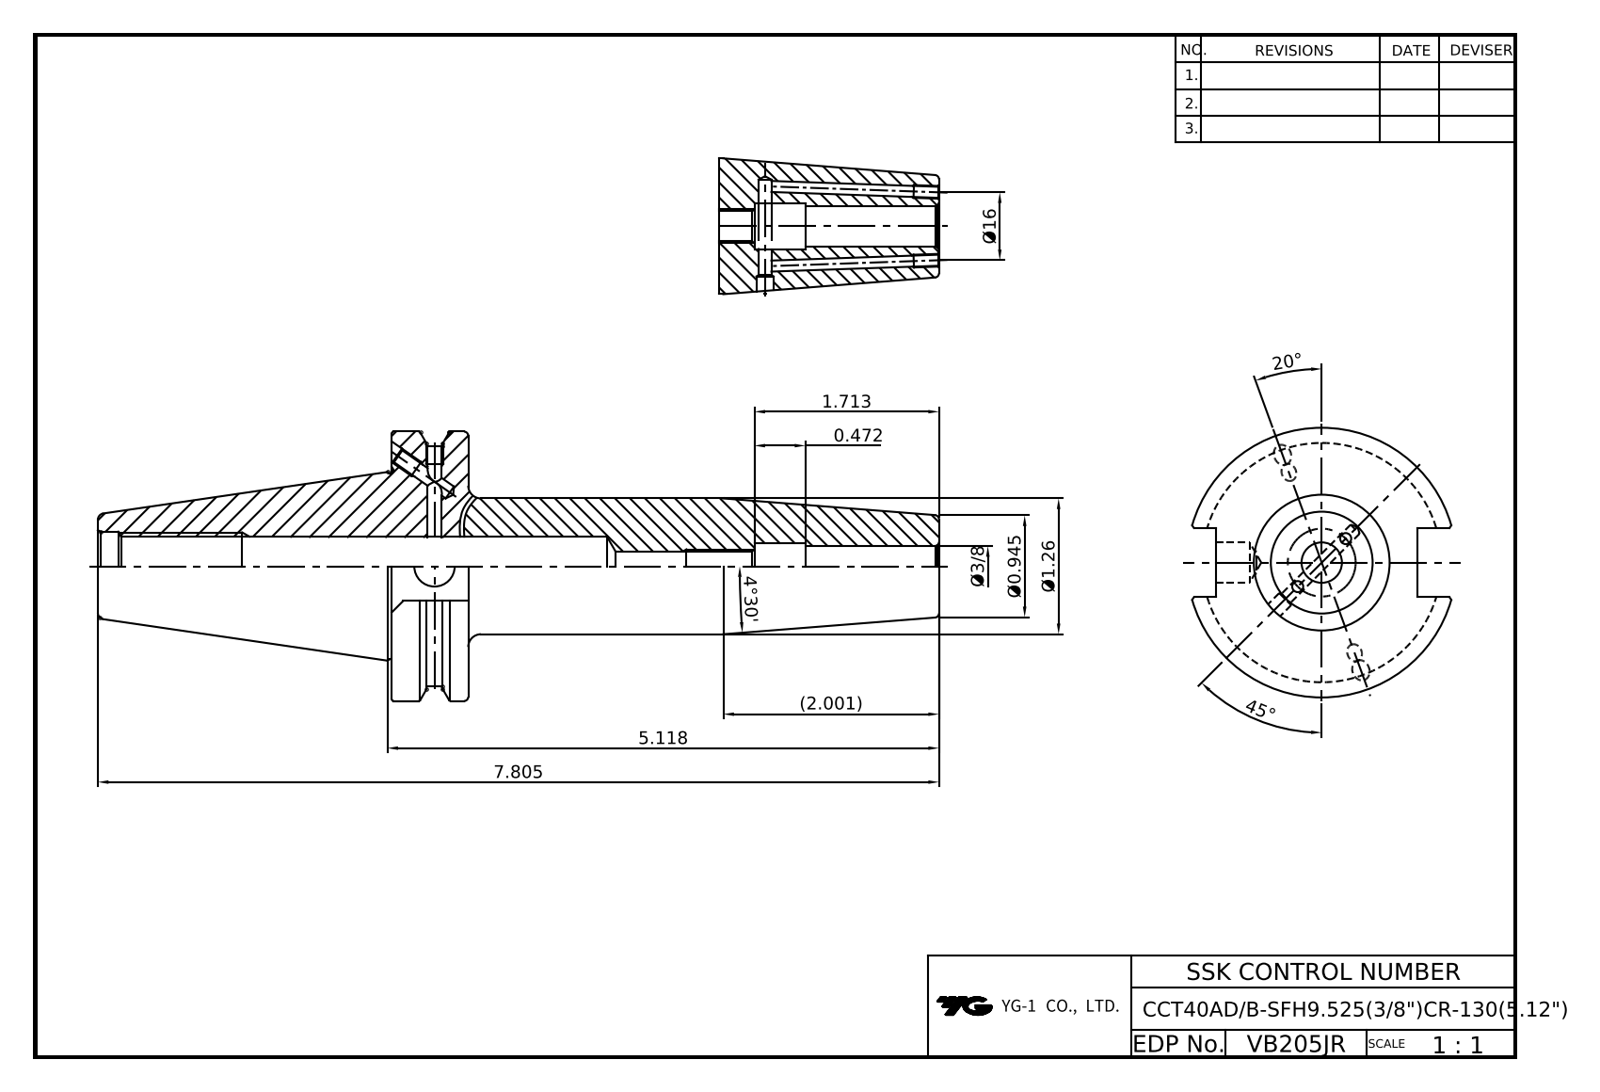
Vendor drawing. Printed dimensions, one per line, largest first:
45°
20°
Ø16
7.805
5.118
4°30'
(2.001)
1.713
Ø1.26
Ø0.945
0.472
Ø3/8
